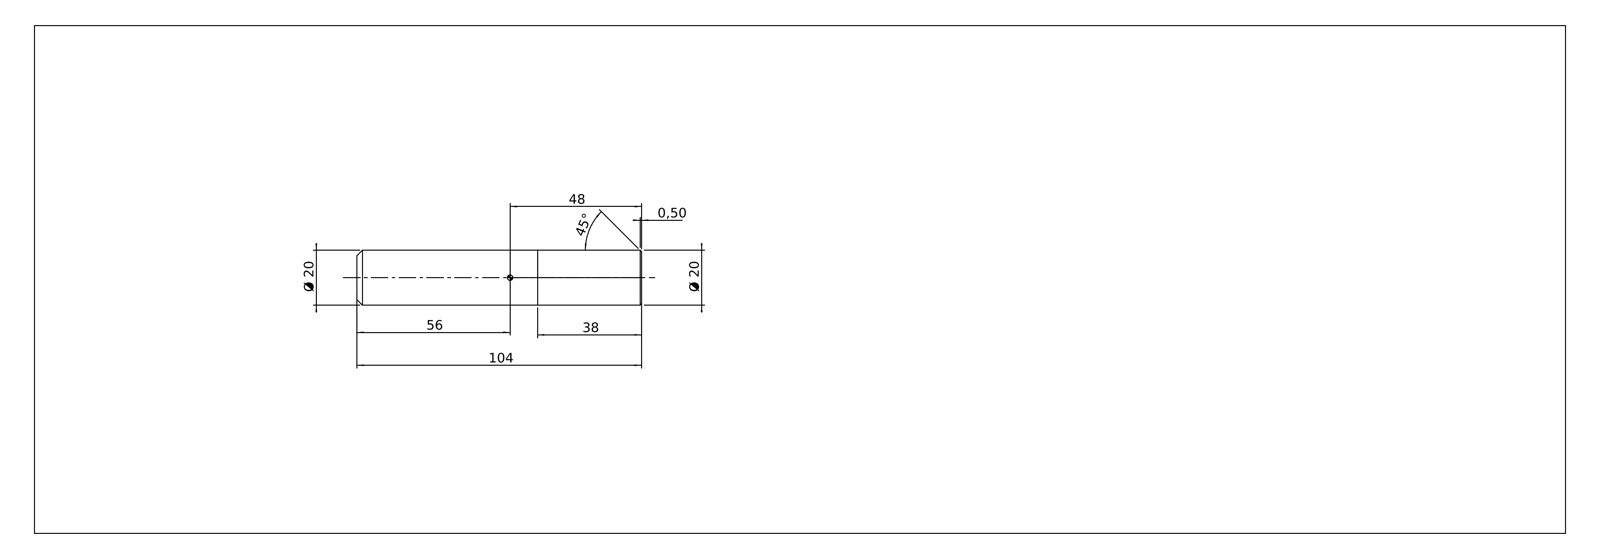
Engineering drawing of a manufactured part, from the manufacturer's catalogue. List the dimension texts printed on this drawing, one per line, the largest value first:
104
56
48
45°
38
Ø 20
Ø 20
0,50
